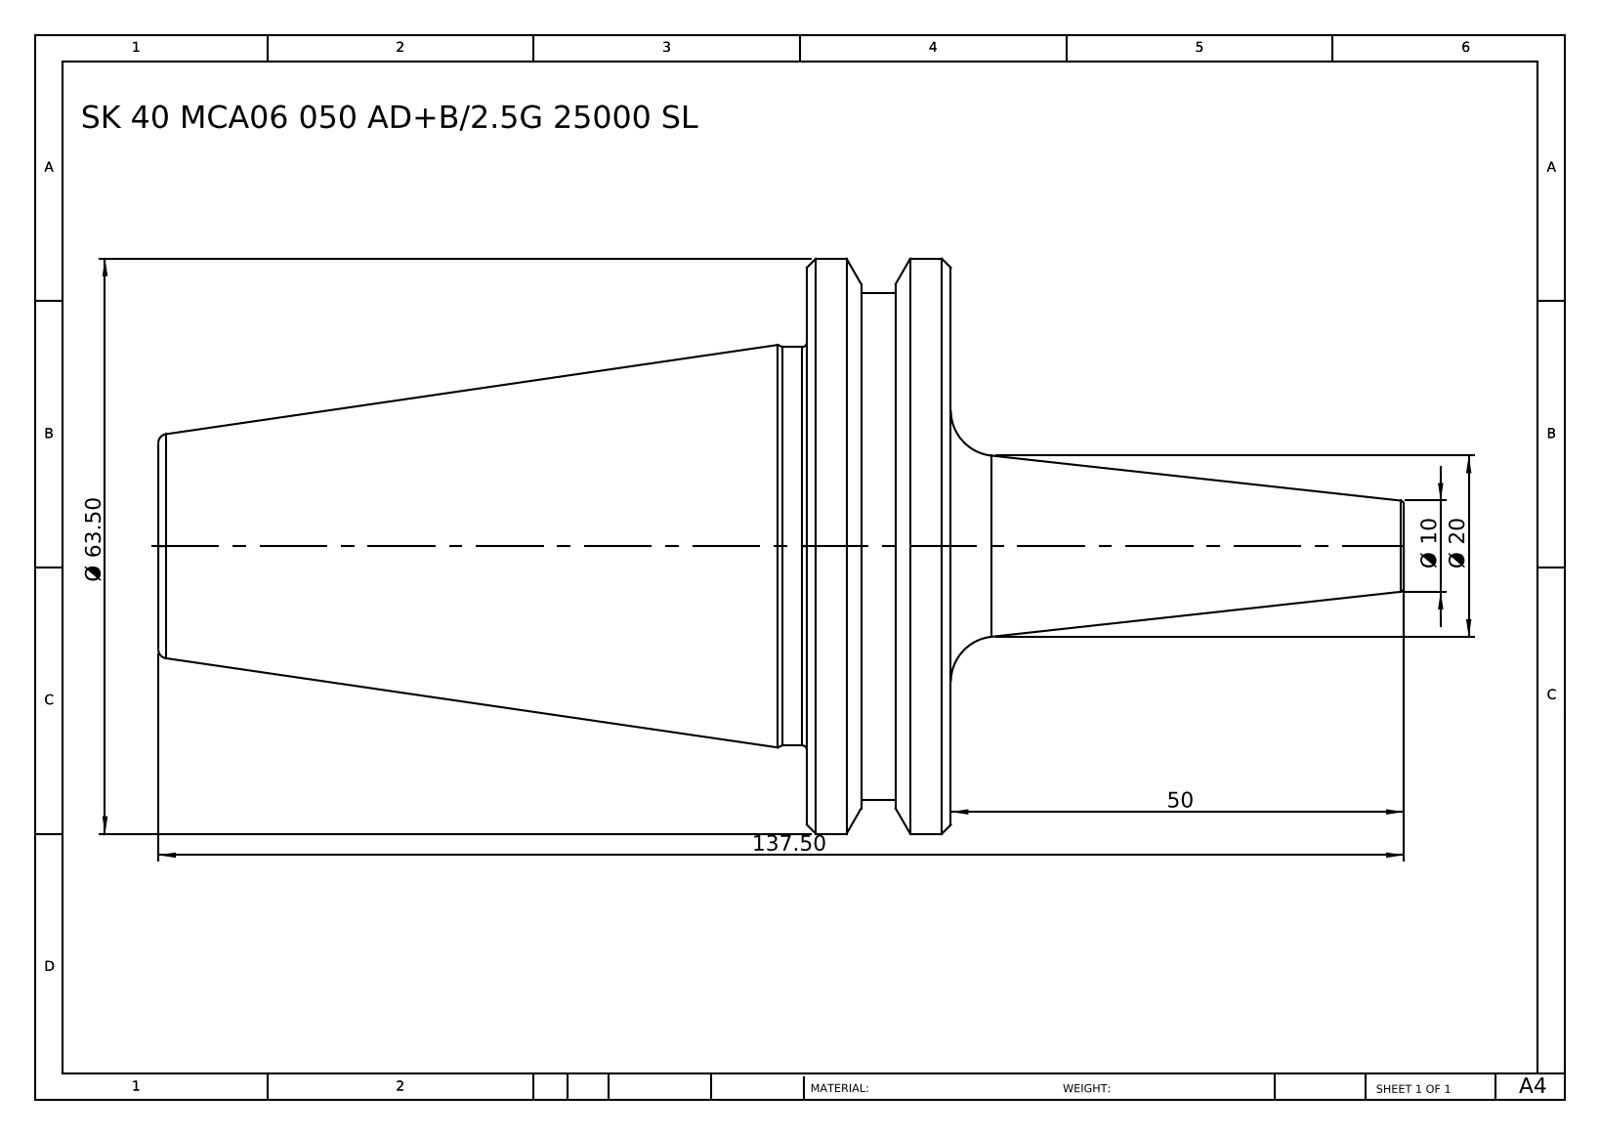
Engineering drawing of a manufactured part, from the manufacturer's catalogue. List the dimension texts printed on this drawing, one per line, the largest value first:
137.50
Ø 63.50
50
Ø 20
Ø 10
